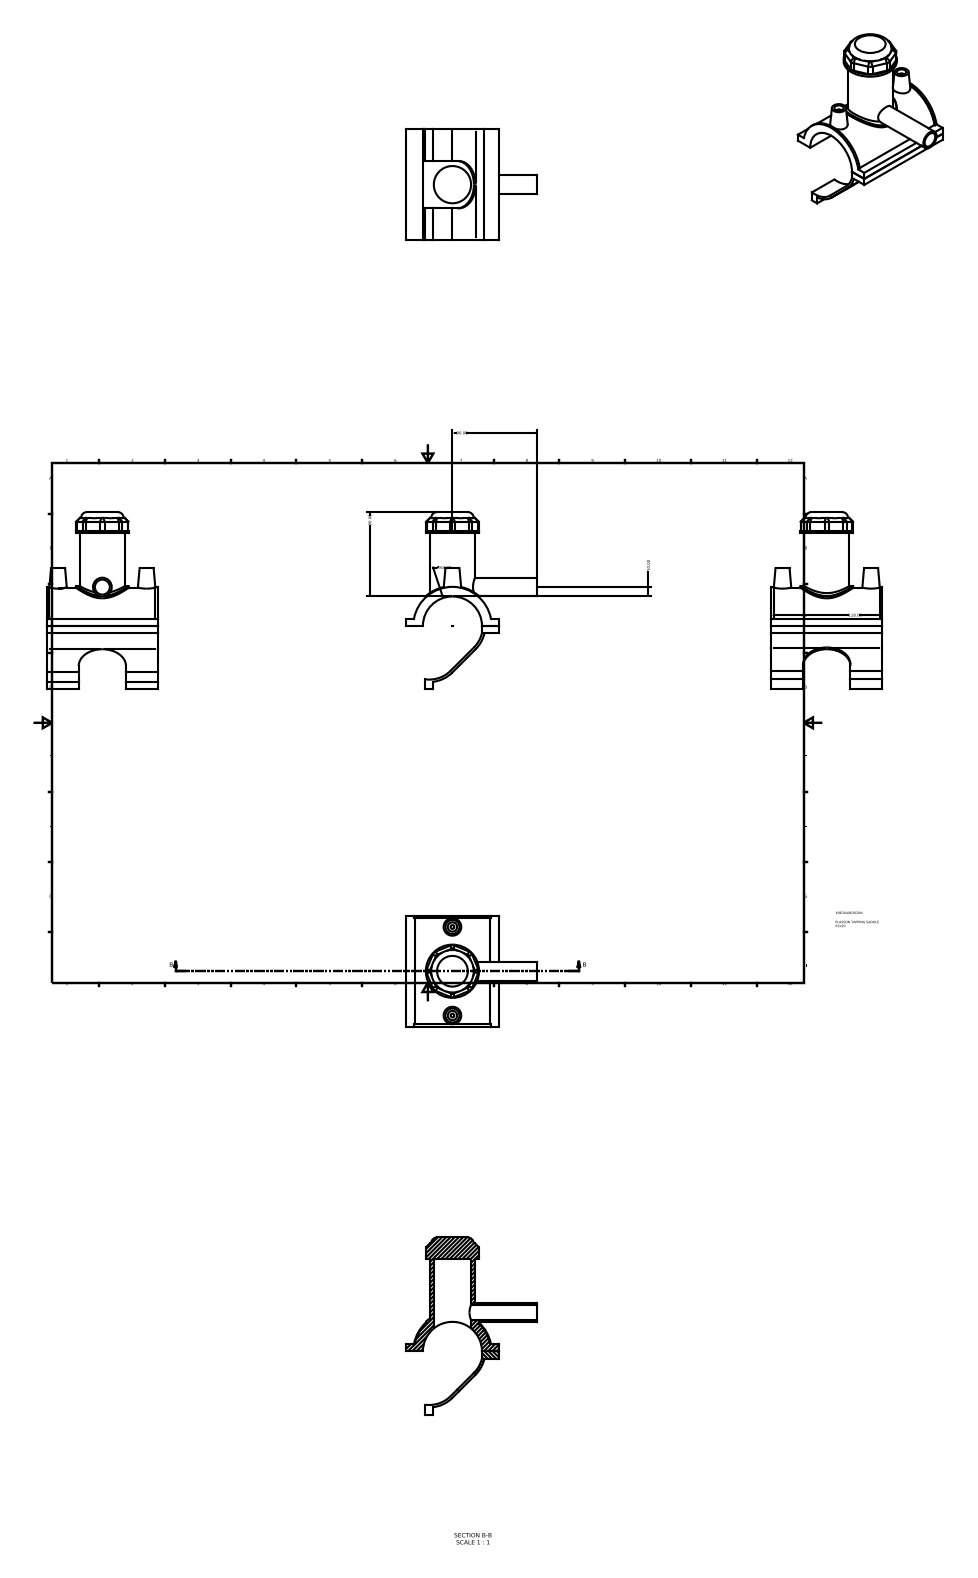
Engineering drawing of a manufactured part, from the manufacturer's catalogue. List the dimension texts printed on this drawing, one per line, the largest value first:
118.00
90.00
90.00
∅63.00
10.00
